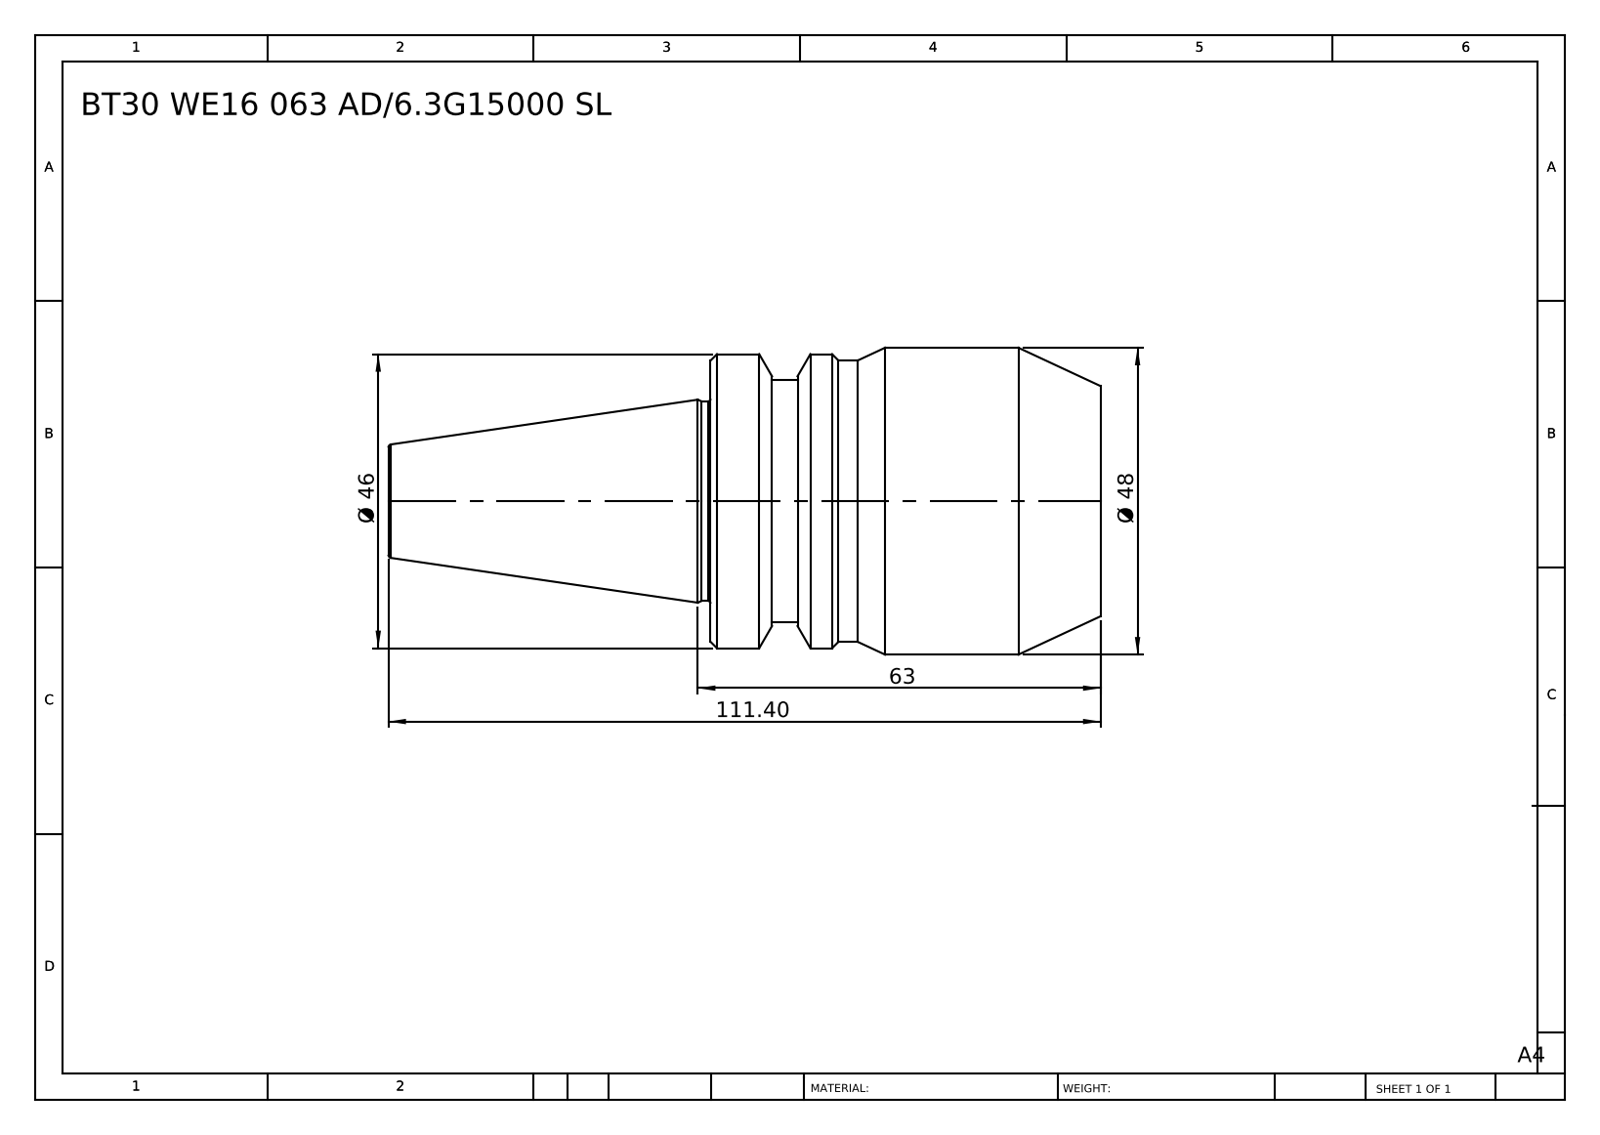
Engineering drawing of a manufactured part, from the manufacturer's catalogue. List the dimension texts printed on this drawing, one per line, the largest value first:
111.40
63
Ø 48
Ø 46
